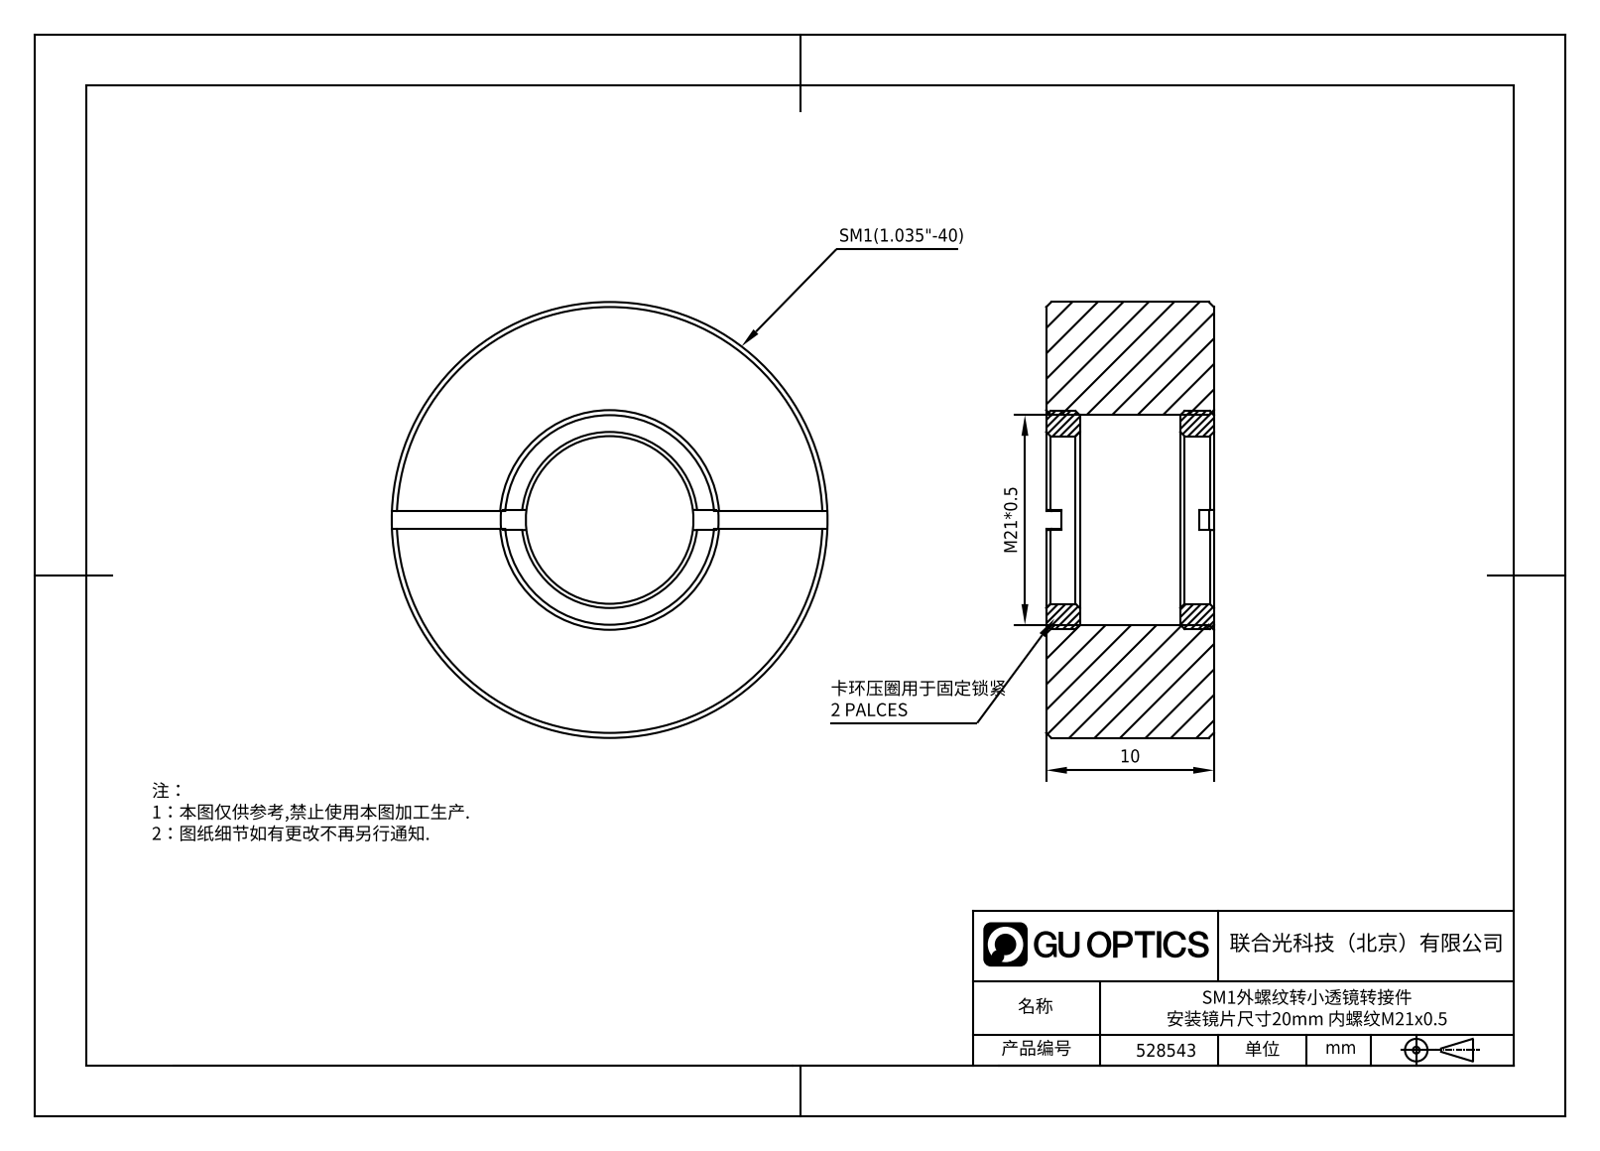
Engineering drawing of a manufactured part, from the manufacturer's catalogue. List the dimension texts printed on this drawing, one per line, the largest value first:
M21*0.5
10
